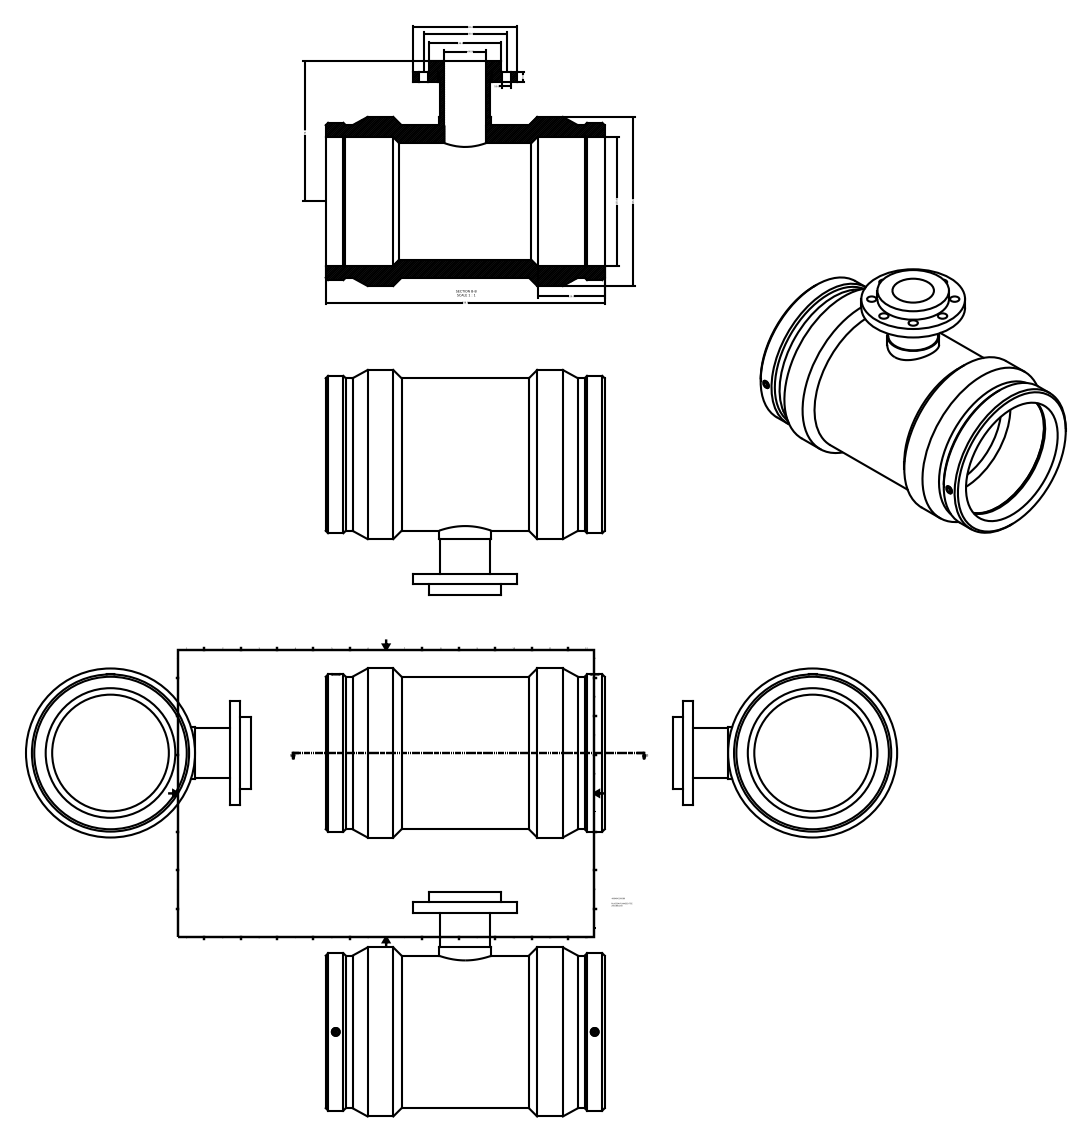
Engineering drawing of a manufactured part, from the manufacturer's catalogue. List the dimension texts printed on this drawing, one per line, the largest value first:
538.00
326.00
270.00
n250.00
200.00
160.00
138.00
129.00
n80.00
20.00
18.00
